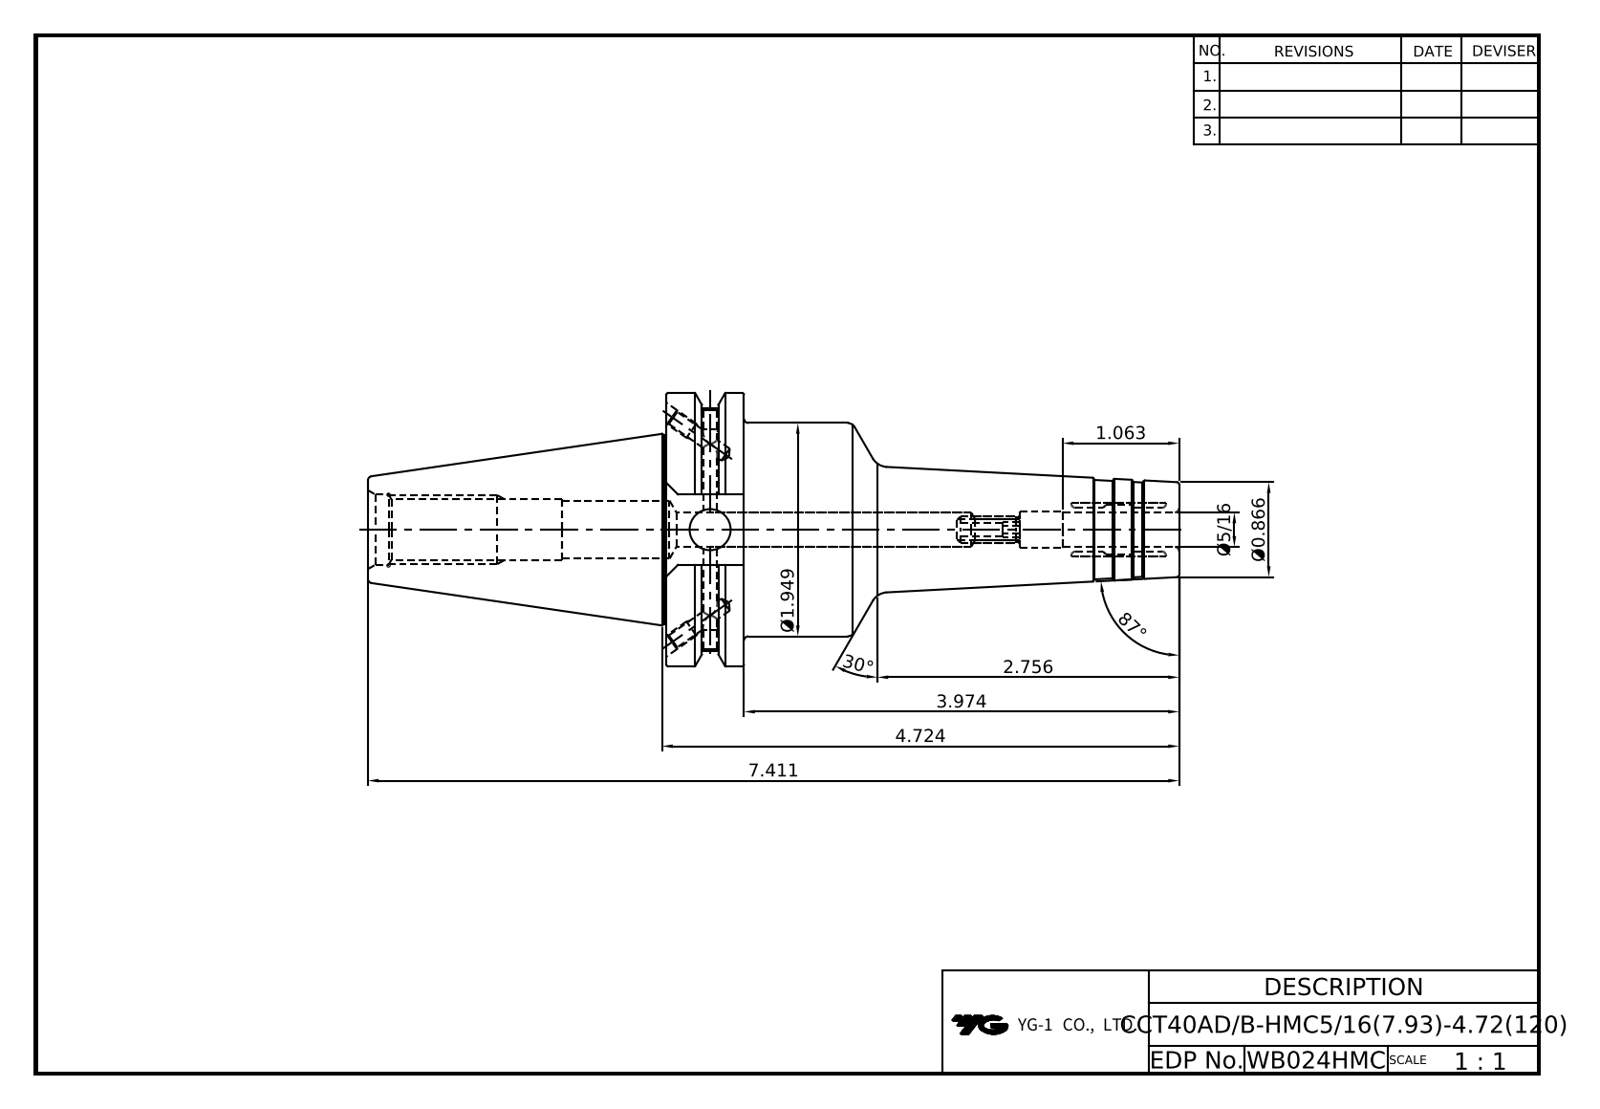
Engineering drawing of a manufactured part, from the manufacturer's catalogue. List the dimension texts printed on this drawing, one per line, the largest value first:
87°
30°
7.411
4.724
3.974
2.756
Ø1.949
1.063
Ø0.866
Ø5/16
